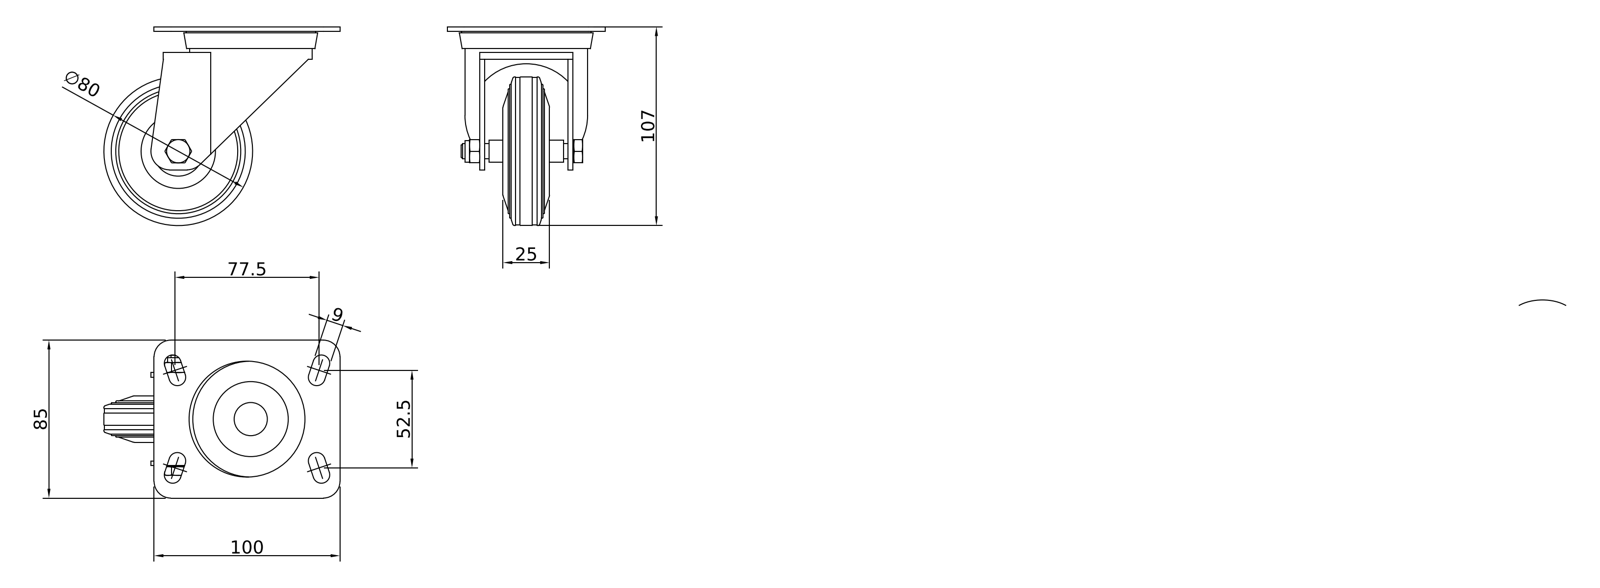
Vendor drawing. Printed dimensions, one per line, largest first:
107
100
85
∅80
77.5
52.5
25
9
